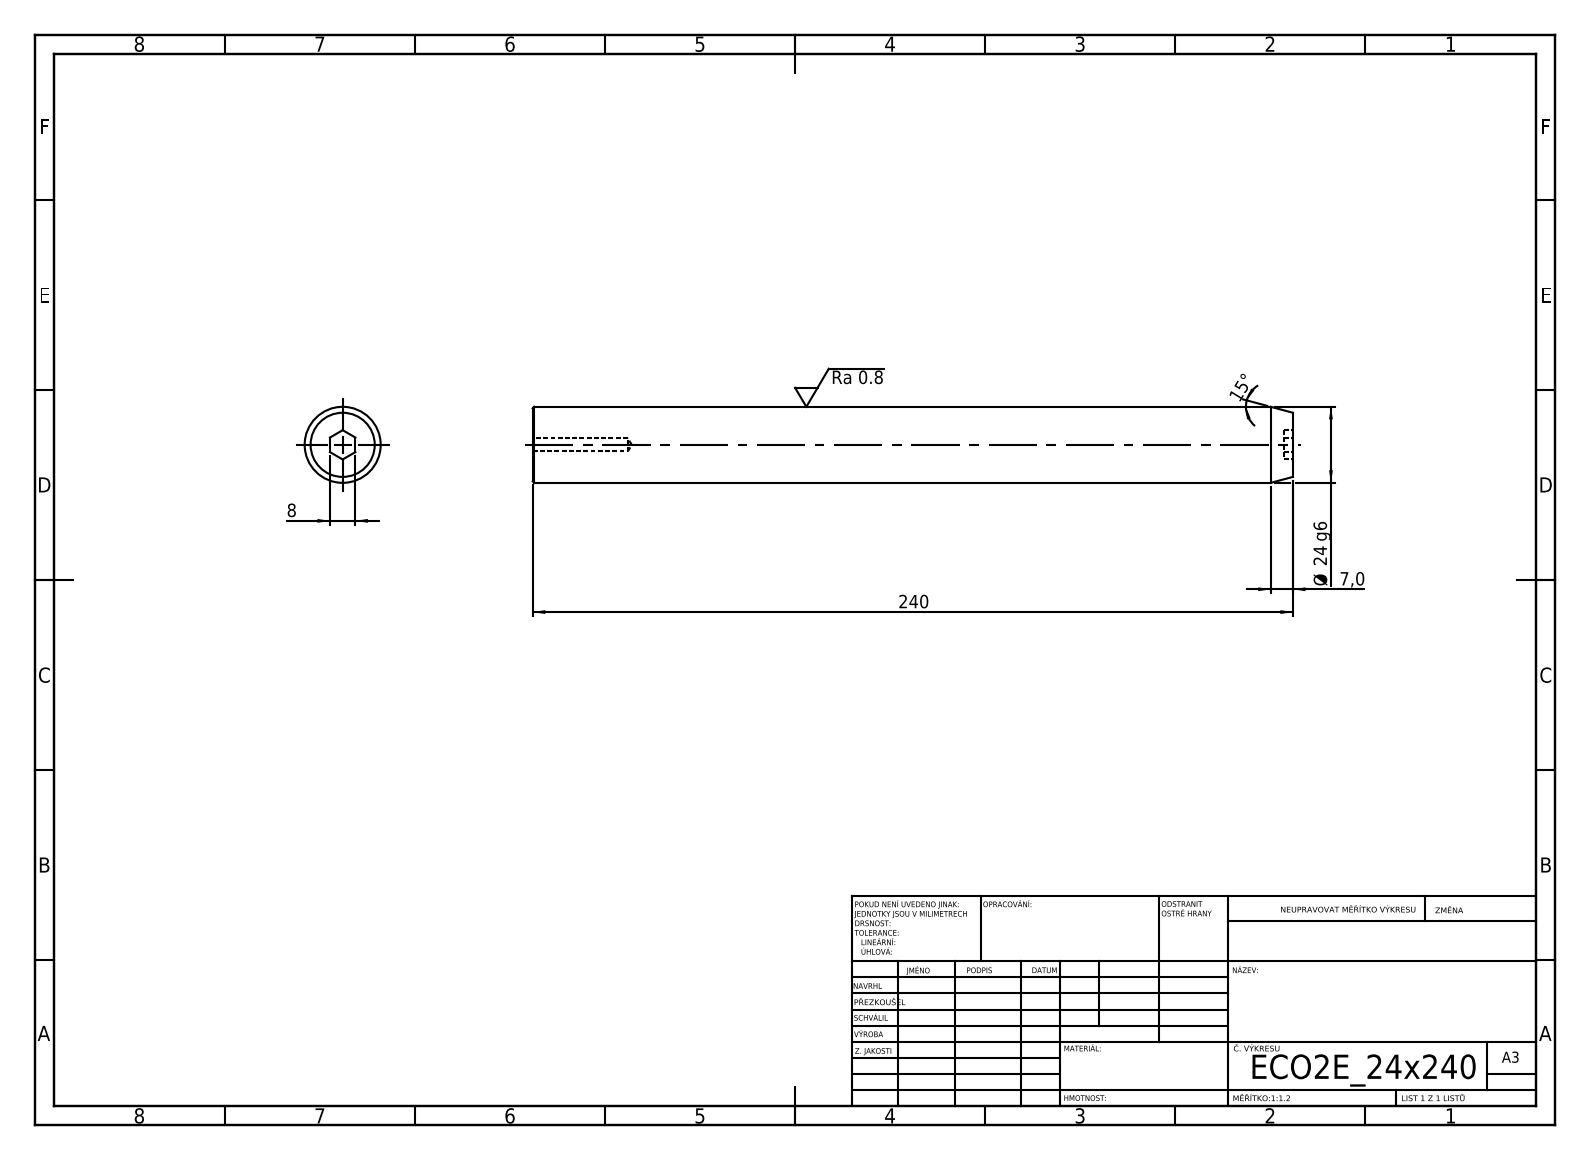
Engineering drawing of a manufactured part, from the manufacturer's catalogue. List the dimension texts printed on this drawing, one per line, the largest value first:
240
Ø 24 g6
15°
8
7,0
